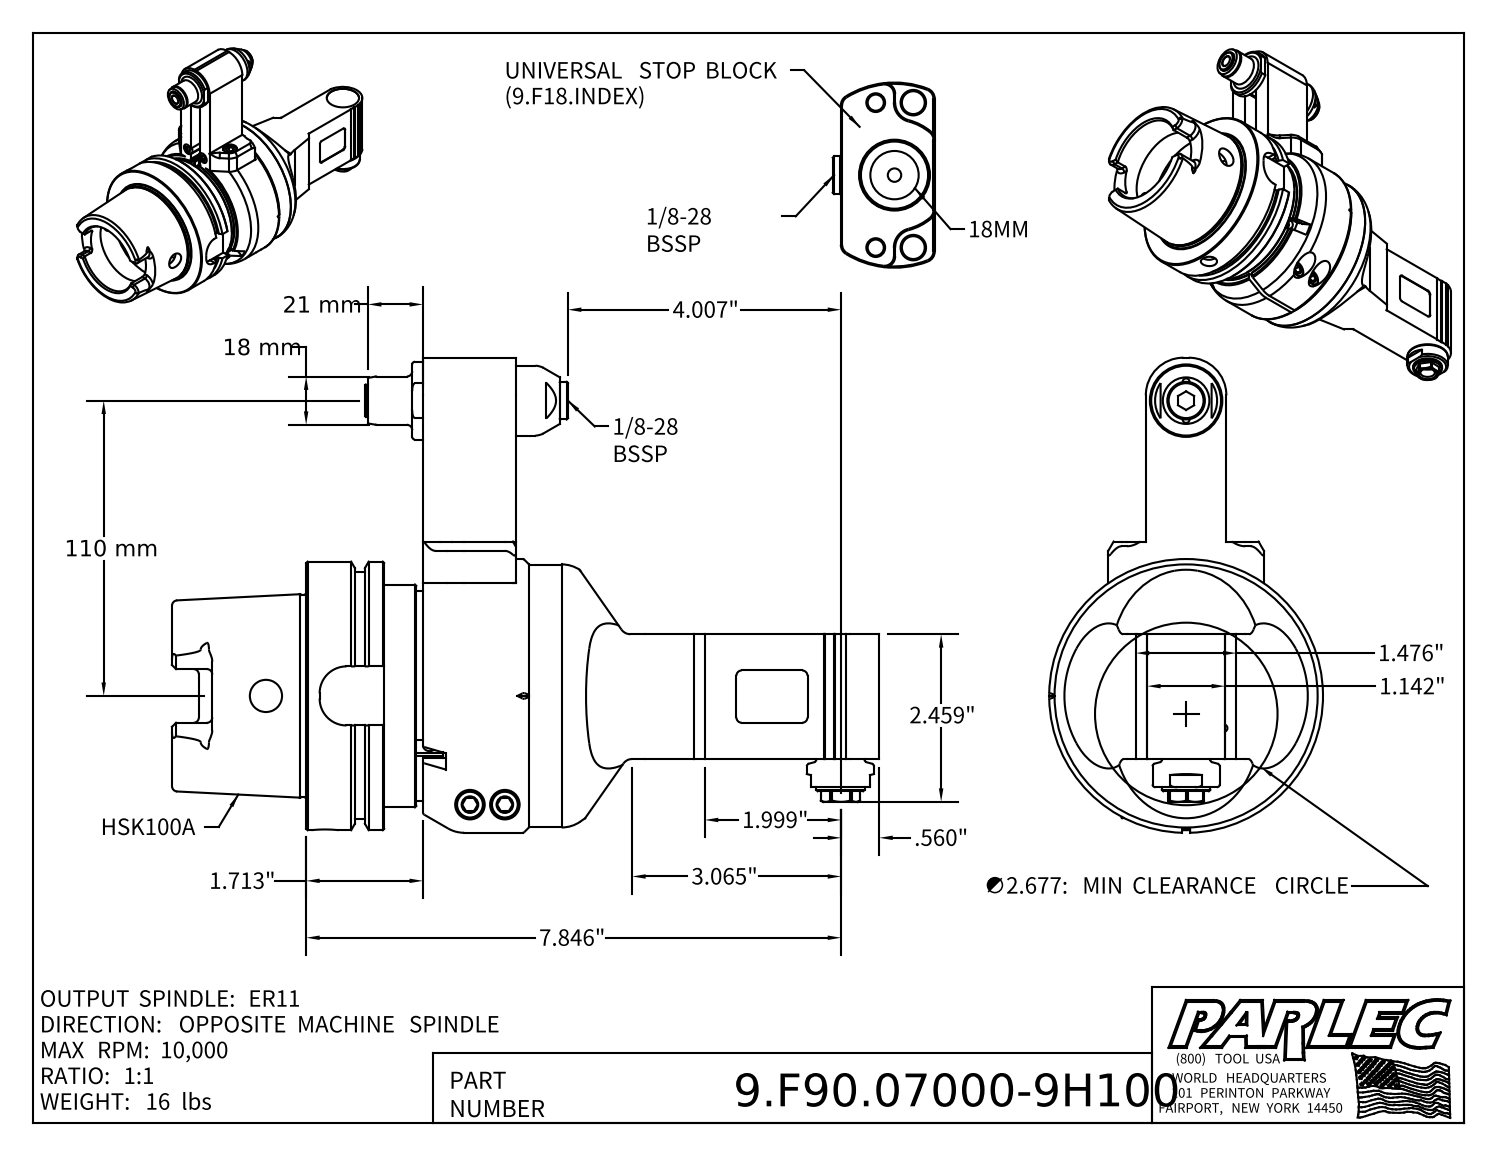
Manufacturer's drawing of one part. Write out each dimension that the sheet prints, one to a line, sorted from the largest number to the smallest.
110 mm
21 mm
18 mm
7.846"
4.007"
3.065"
∅2.677: MIN CLEARANCE CIRCLE
2.459"
1.999"
1.713"
1.476"
1.142"
.560"
